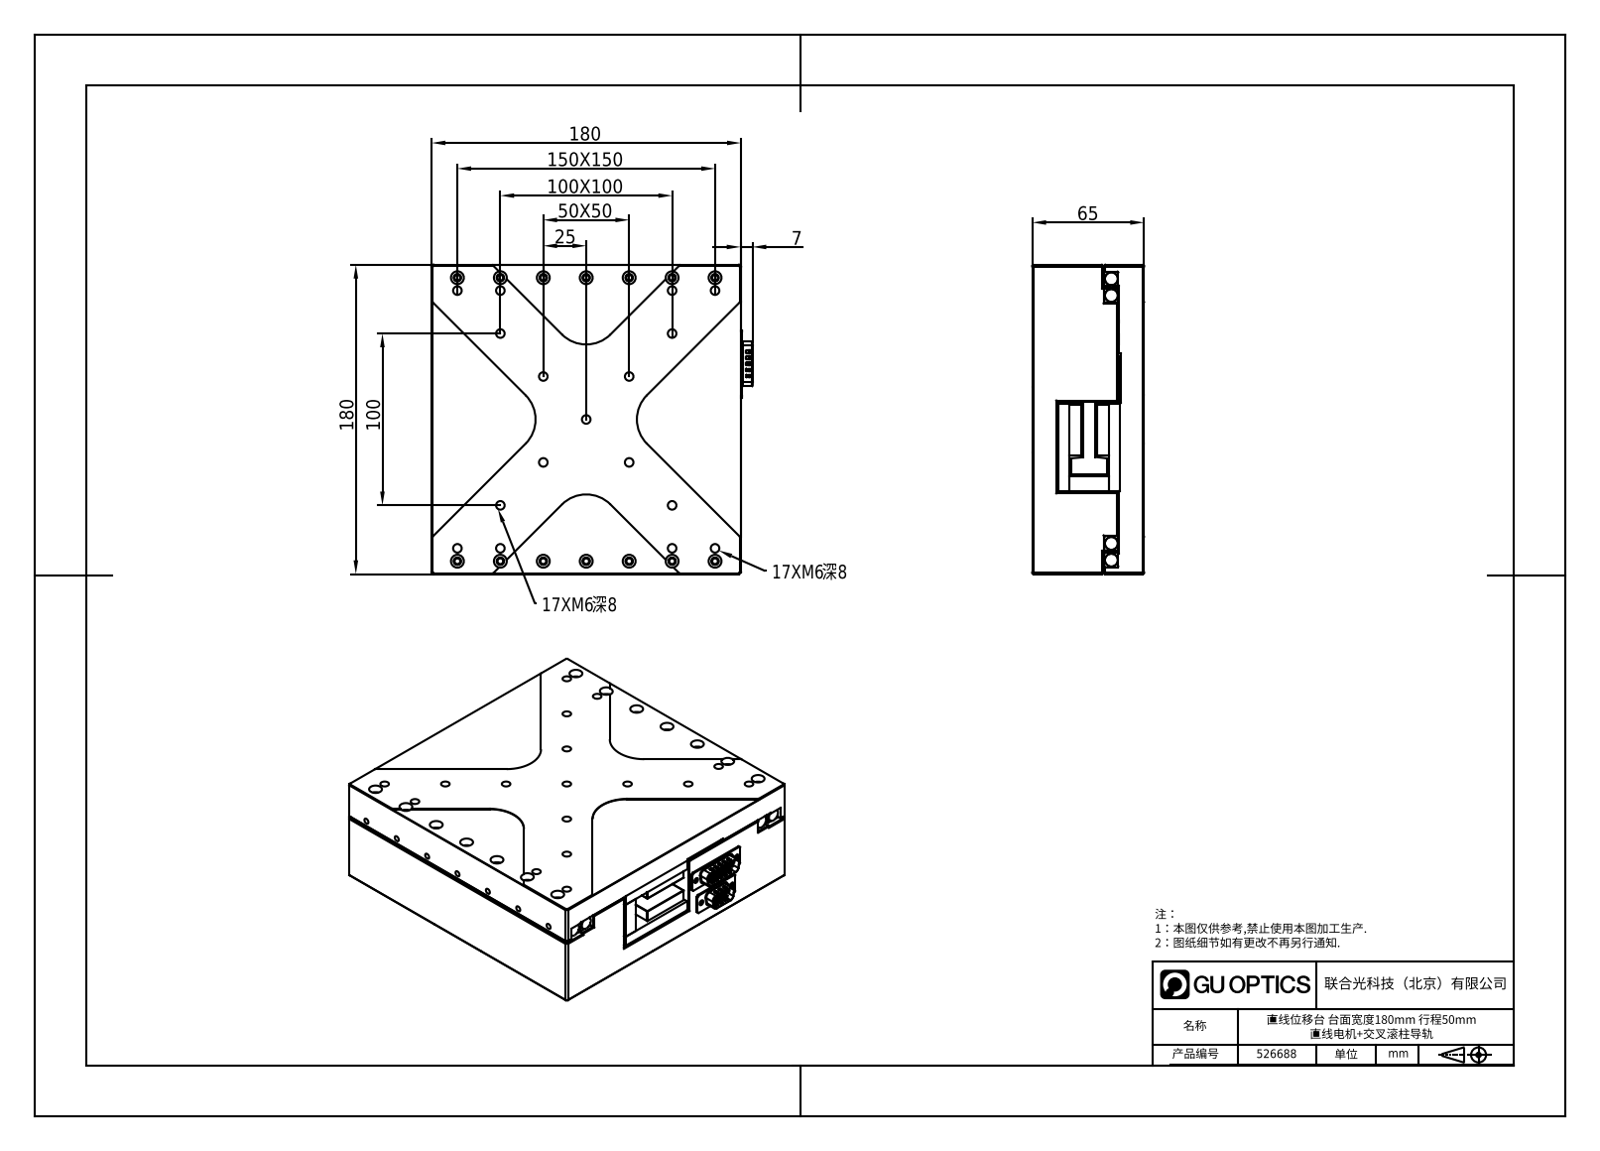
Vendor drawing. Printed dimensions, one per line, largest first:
180
180
150X150
100
100X100
65
50X50
25
7
